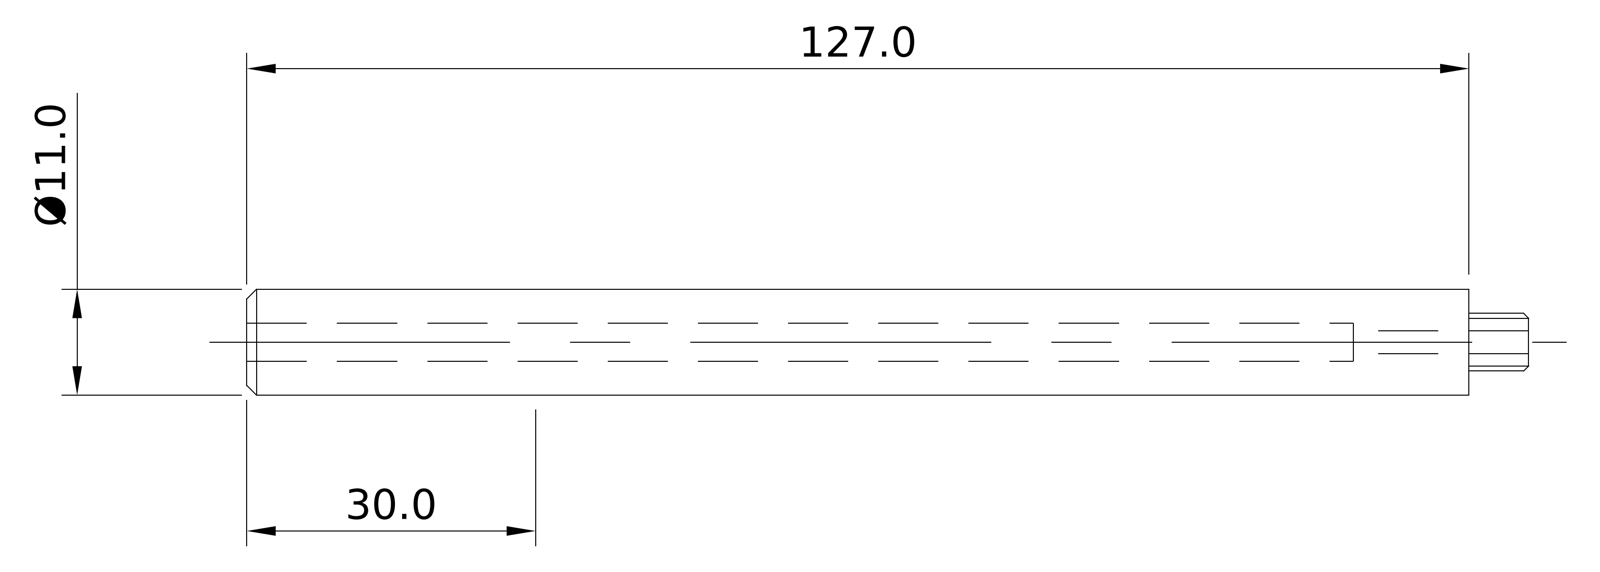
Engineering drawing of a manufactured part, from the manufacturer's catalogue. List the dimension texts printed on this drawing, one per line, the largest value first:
127.0
30.0
Ø11.0
